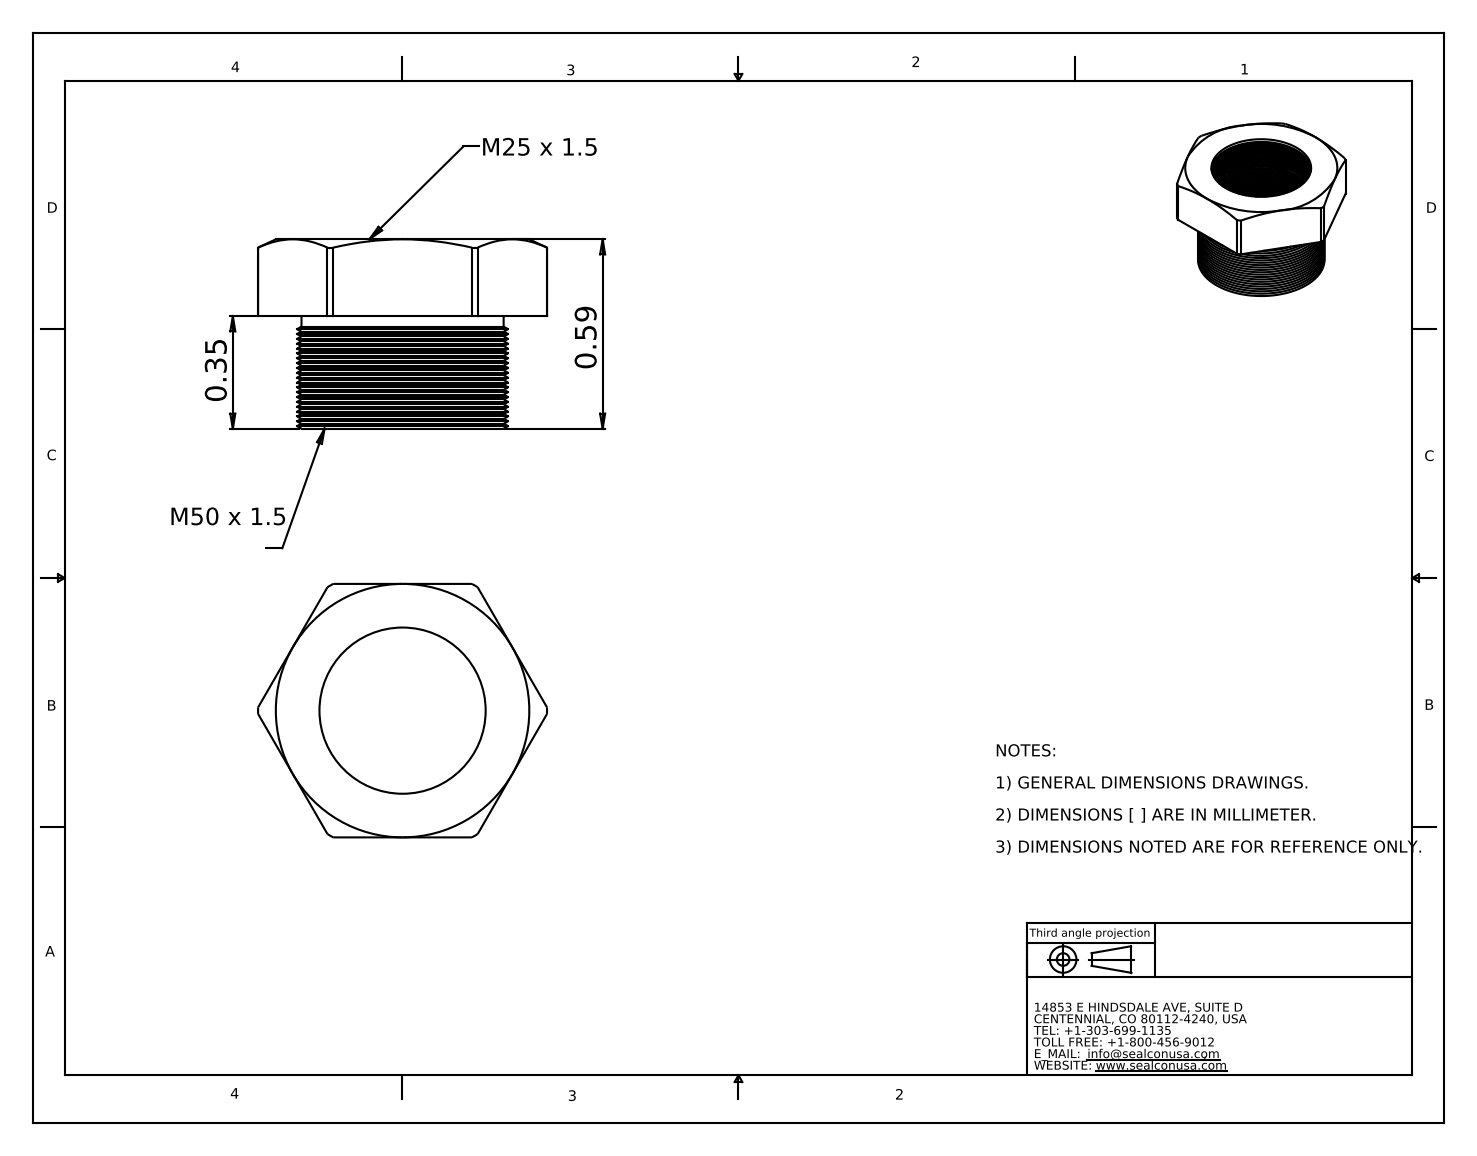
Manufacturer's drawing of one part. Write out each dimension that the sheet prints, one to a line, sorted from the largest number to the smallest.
0.59
0.35
